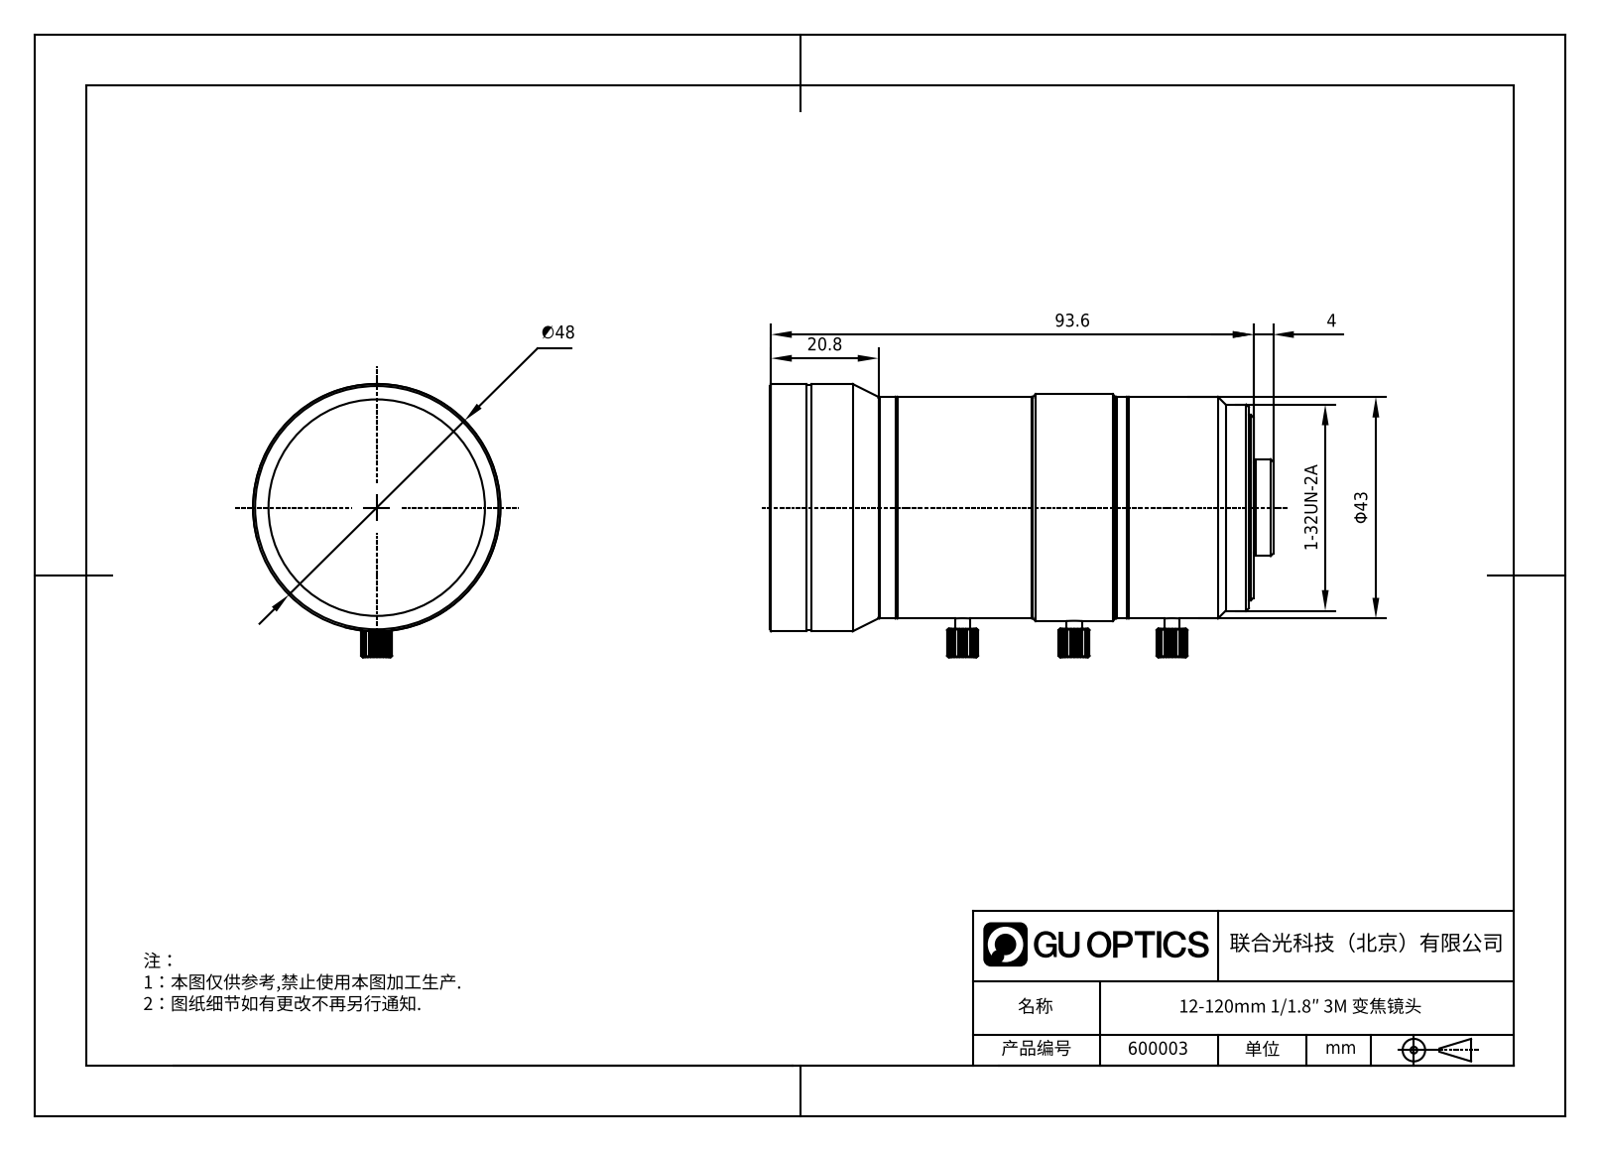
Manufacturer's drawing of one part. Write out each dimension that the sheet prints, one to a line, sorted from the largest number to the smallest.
93.6
∅48
Φ43
20.8
4
1-32UN-2A
